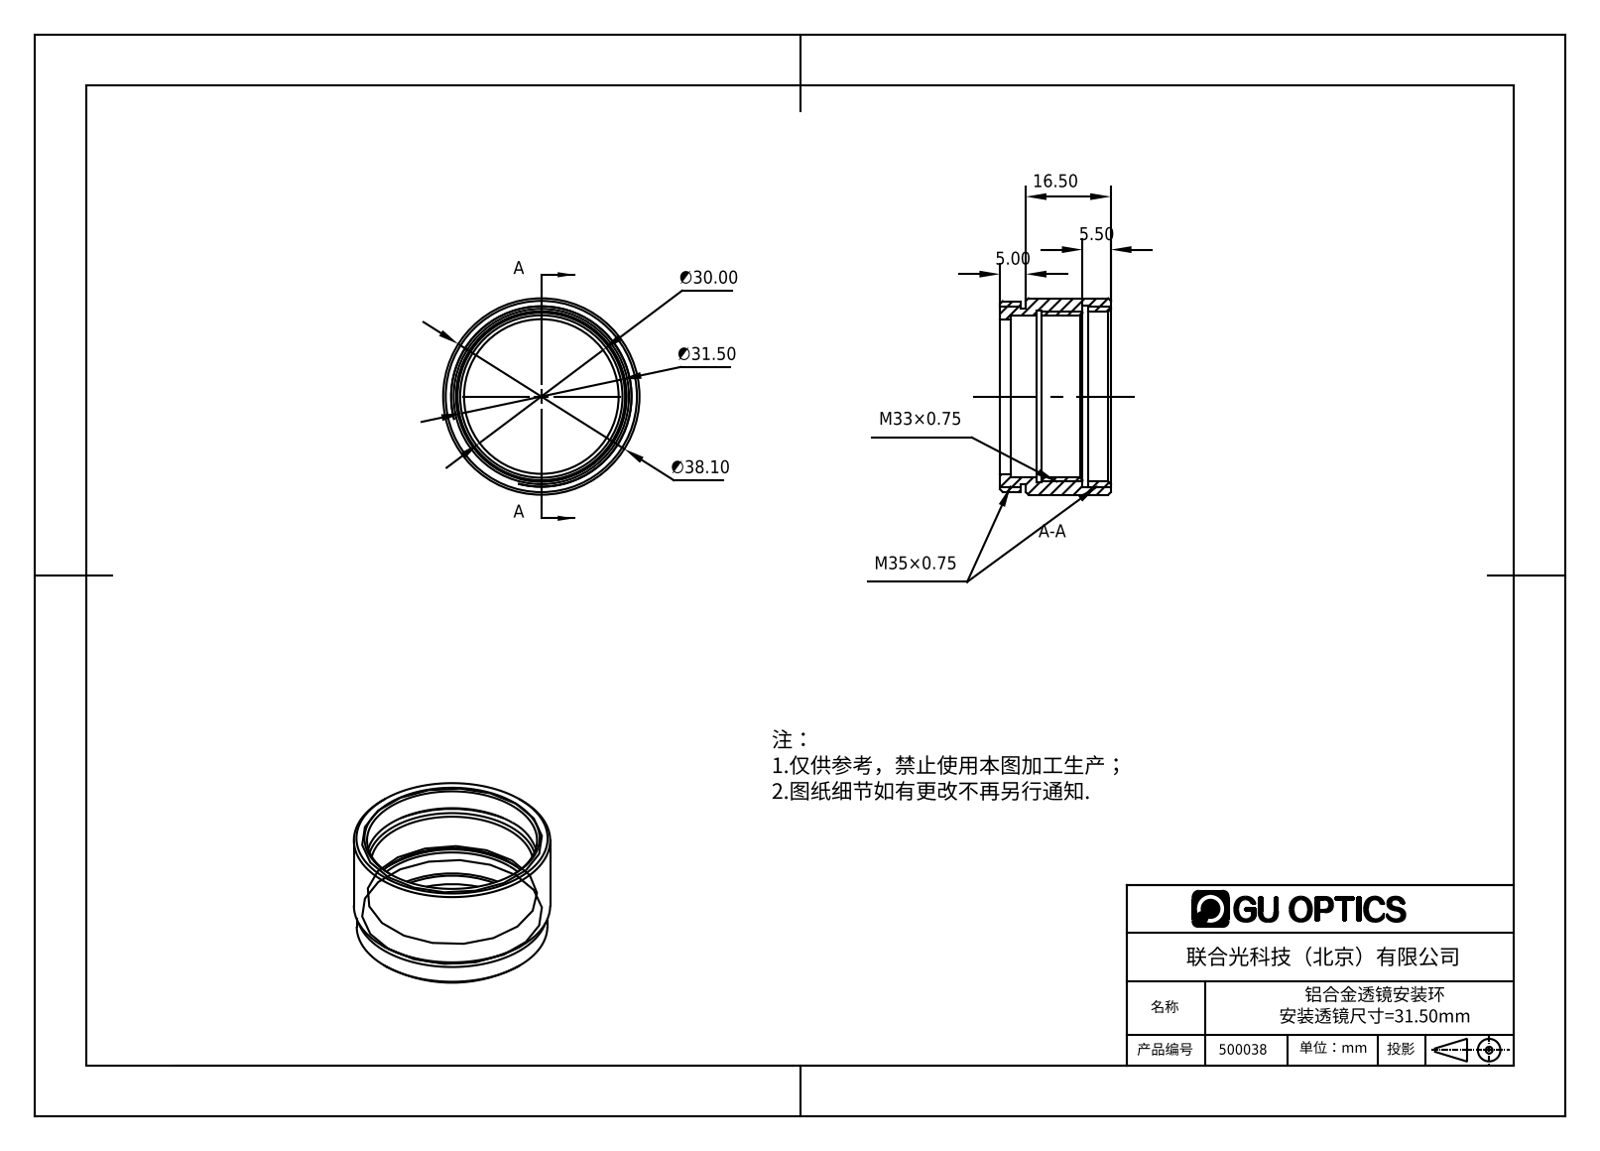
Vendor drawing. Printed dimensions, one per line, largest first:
∅38.10
∅31.50
∅30.00
16.50
5.50
5.00
